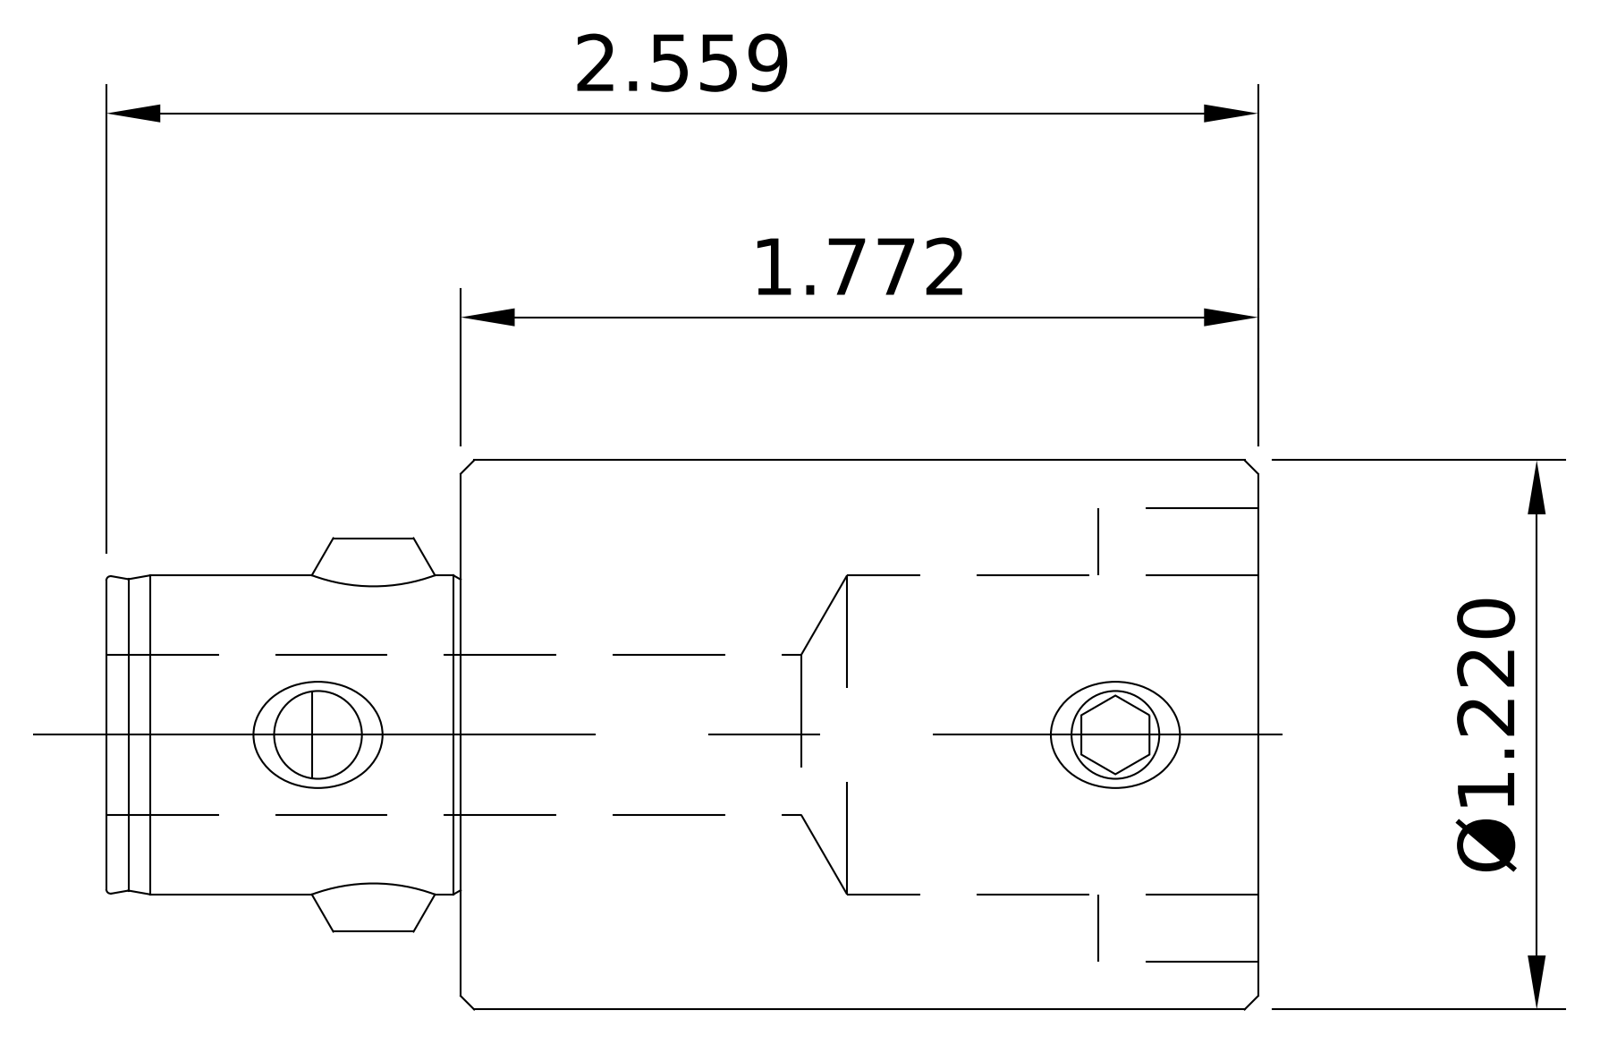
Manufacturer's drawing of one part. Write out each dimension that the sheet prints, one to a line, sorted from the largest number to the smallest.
2.559
1.772
Ø1.220
